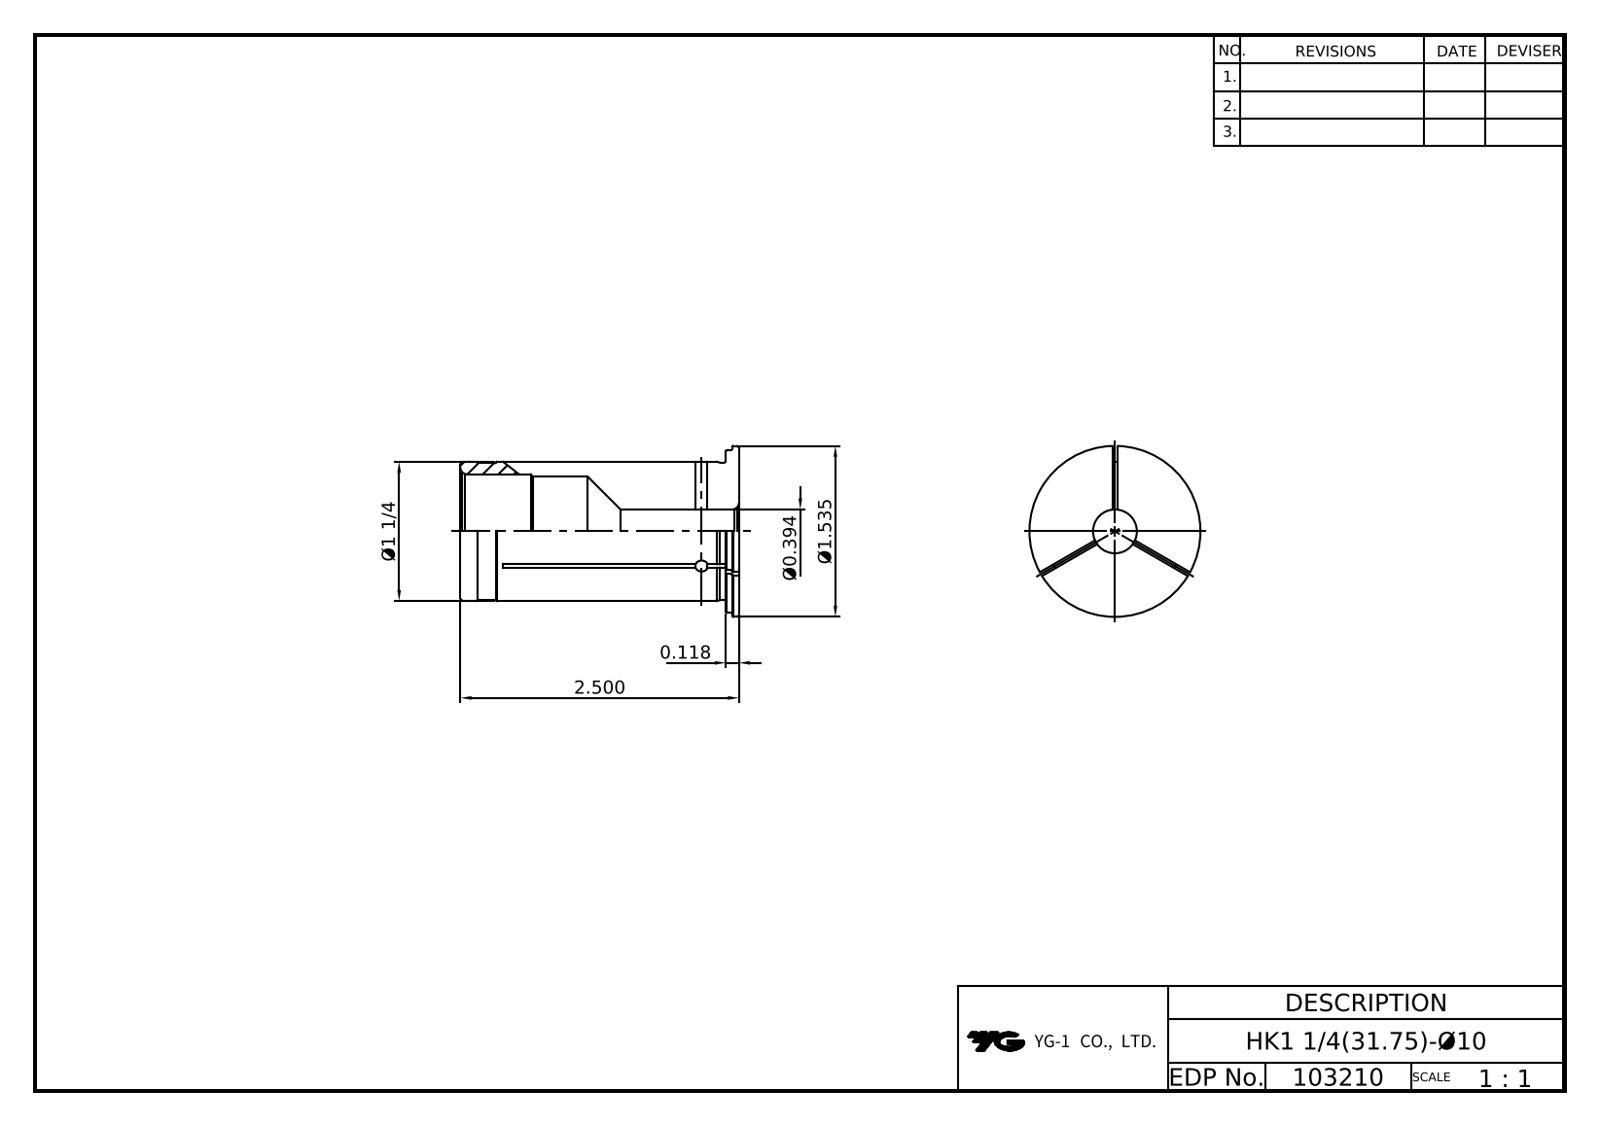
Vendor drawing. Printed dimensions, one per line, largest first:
2.500
Ø1.535
Ø1 1/4
0.118
